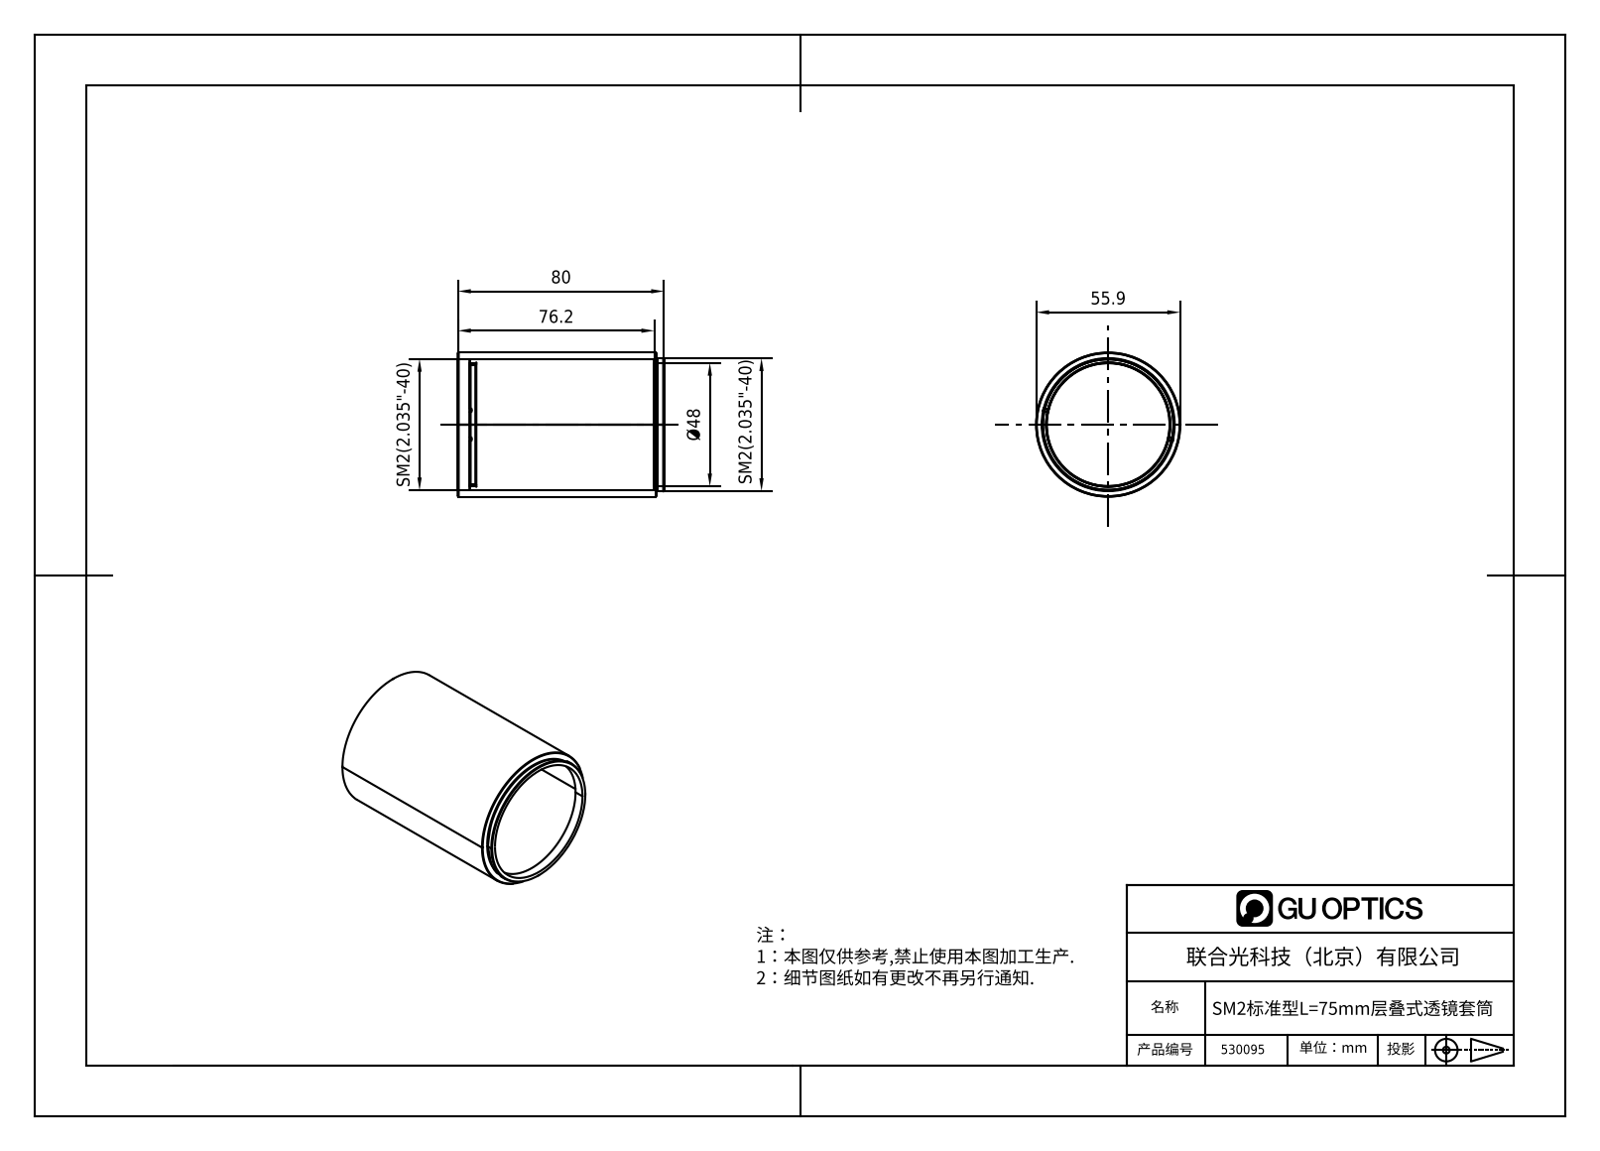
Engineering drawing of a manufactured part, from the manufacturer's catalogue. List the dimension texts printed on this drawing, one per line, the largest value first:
80
76.2
55.9
Ø48
SM2(2.035"-40)
SM2(2.035"-40)
